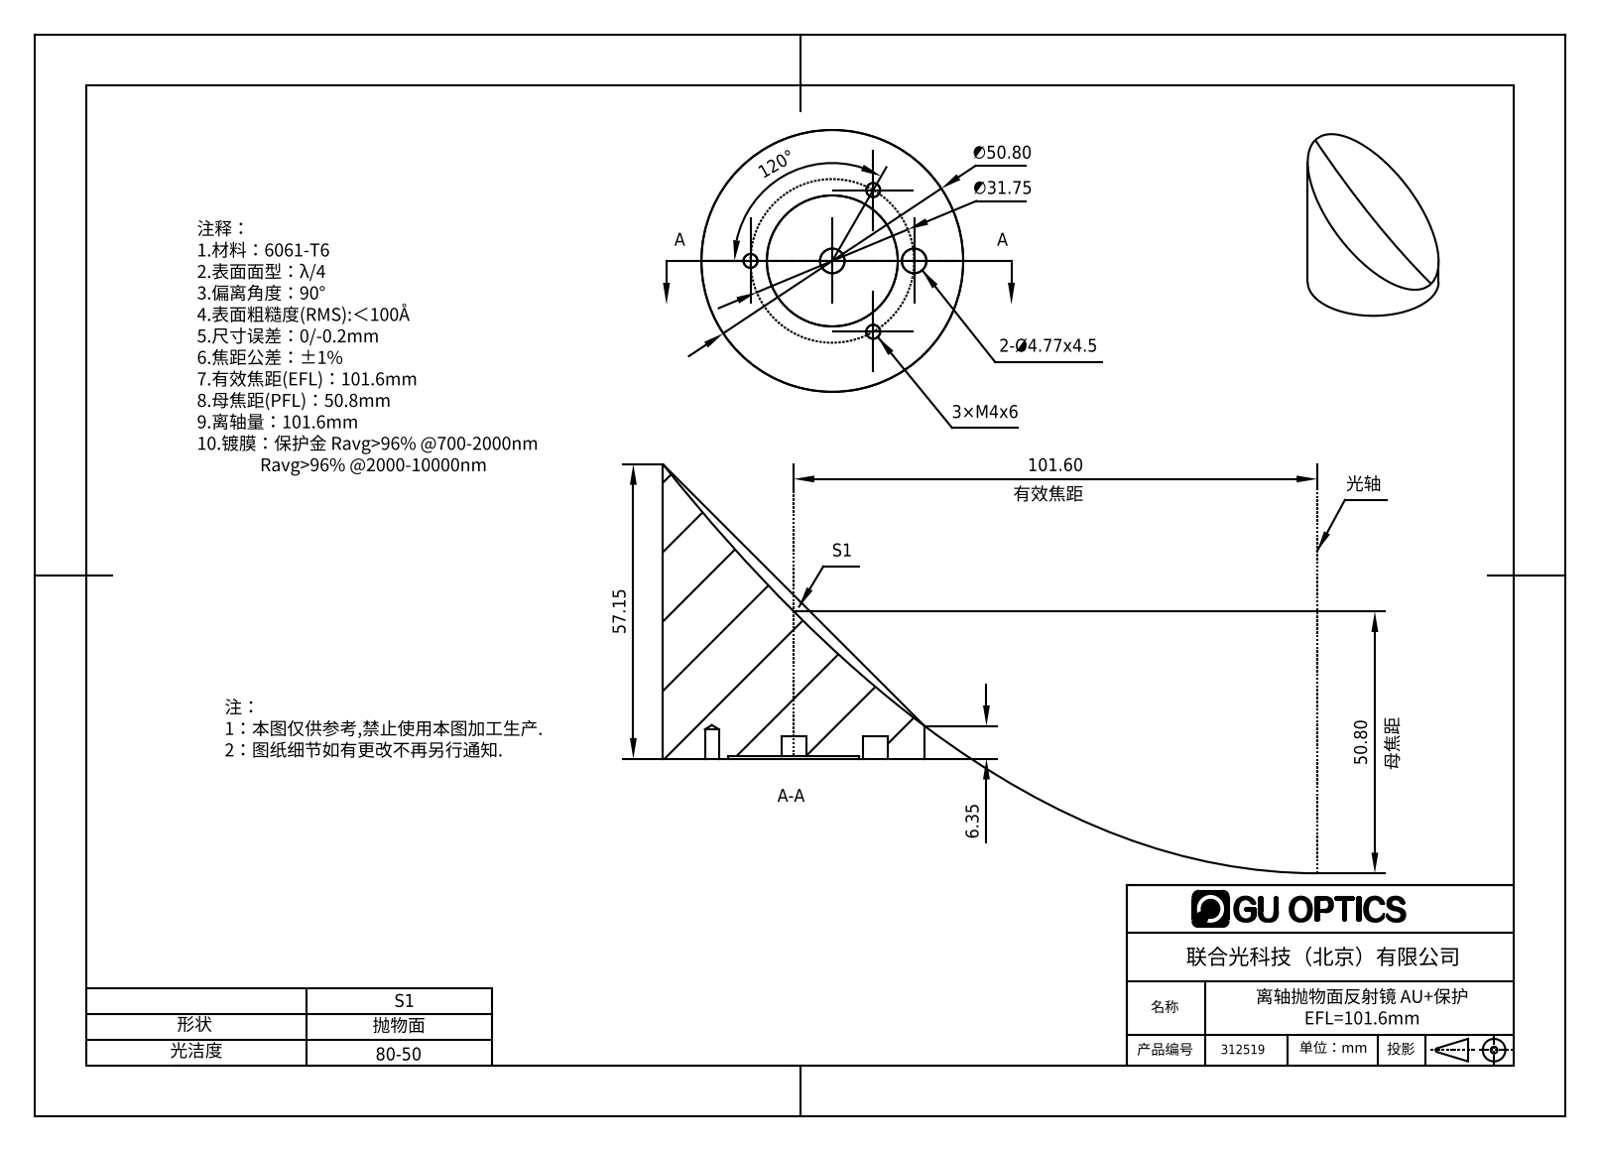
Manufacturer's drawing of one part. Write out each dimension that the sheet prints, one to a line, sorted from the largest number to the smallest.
120°
101.60
57.15
50.80
∅50.80
∅31.75
6.35
